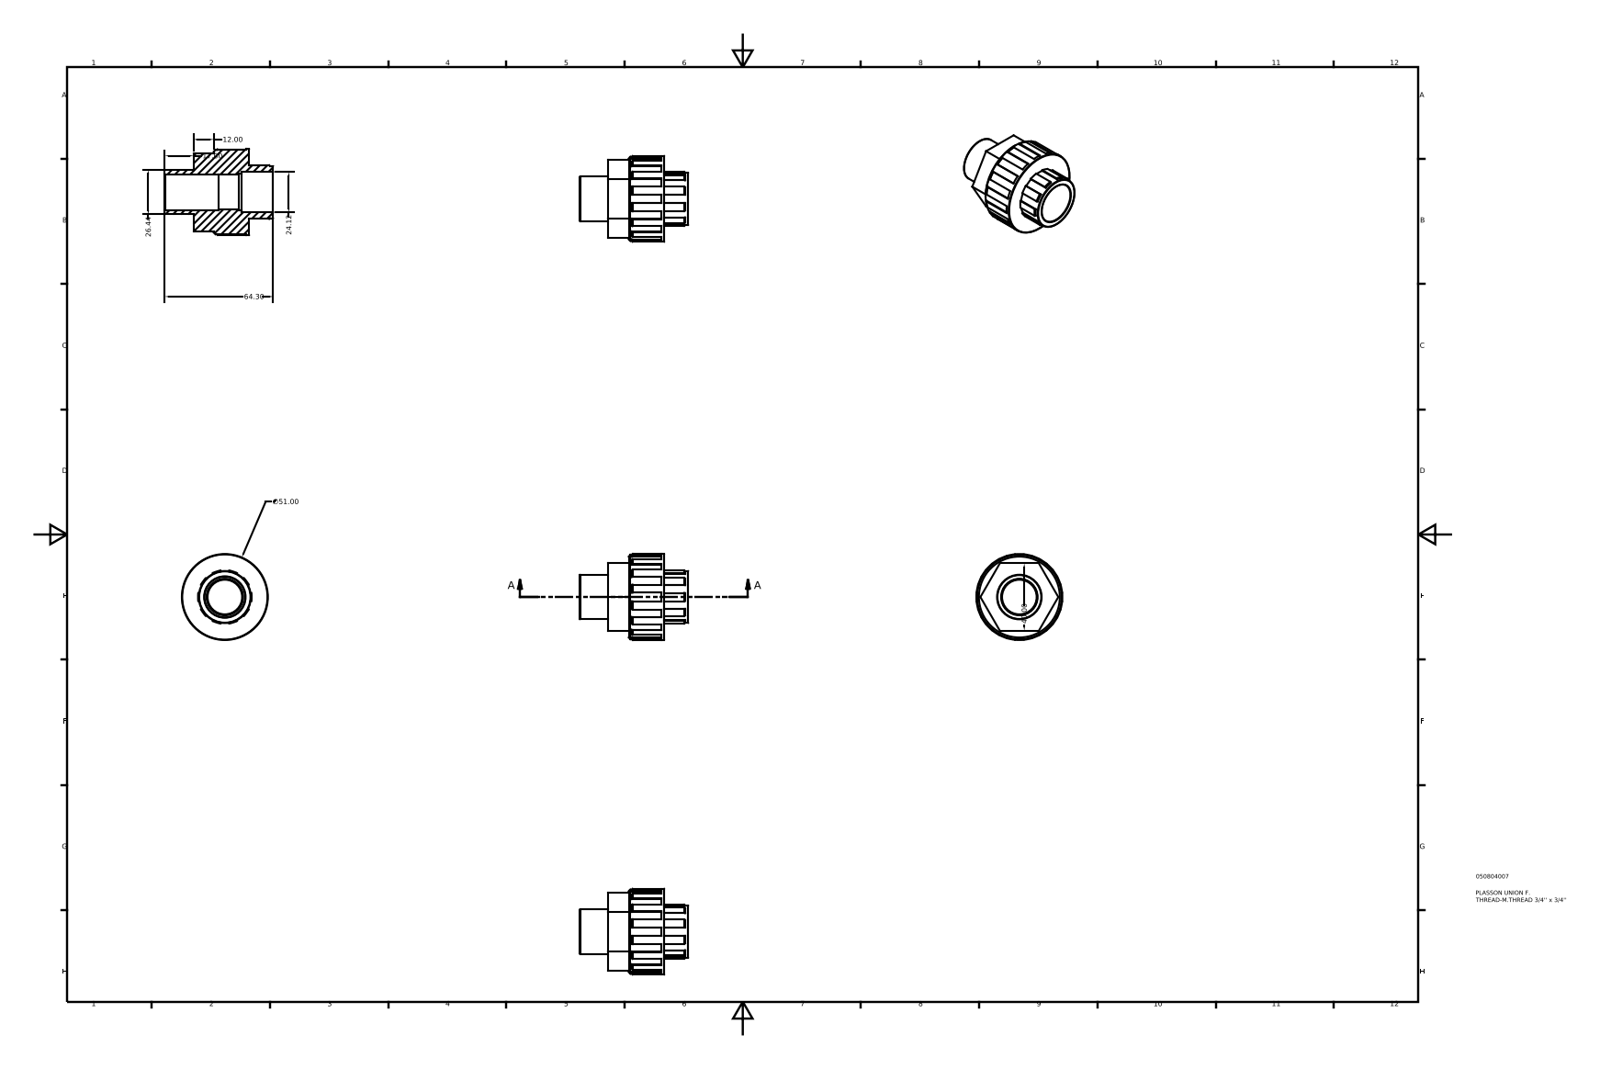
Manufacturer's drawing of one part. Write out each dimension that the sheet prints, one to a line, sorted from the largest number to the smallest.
64.30
∅51.00
40.00
26.44
24.12
17.00
12.00
